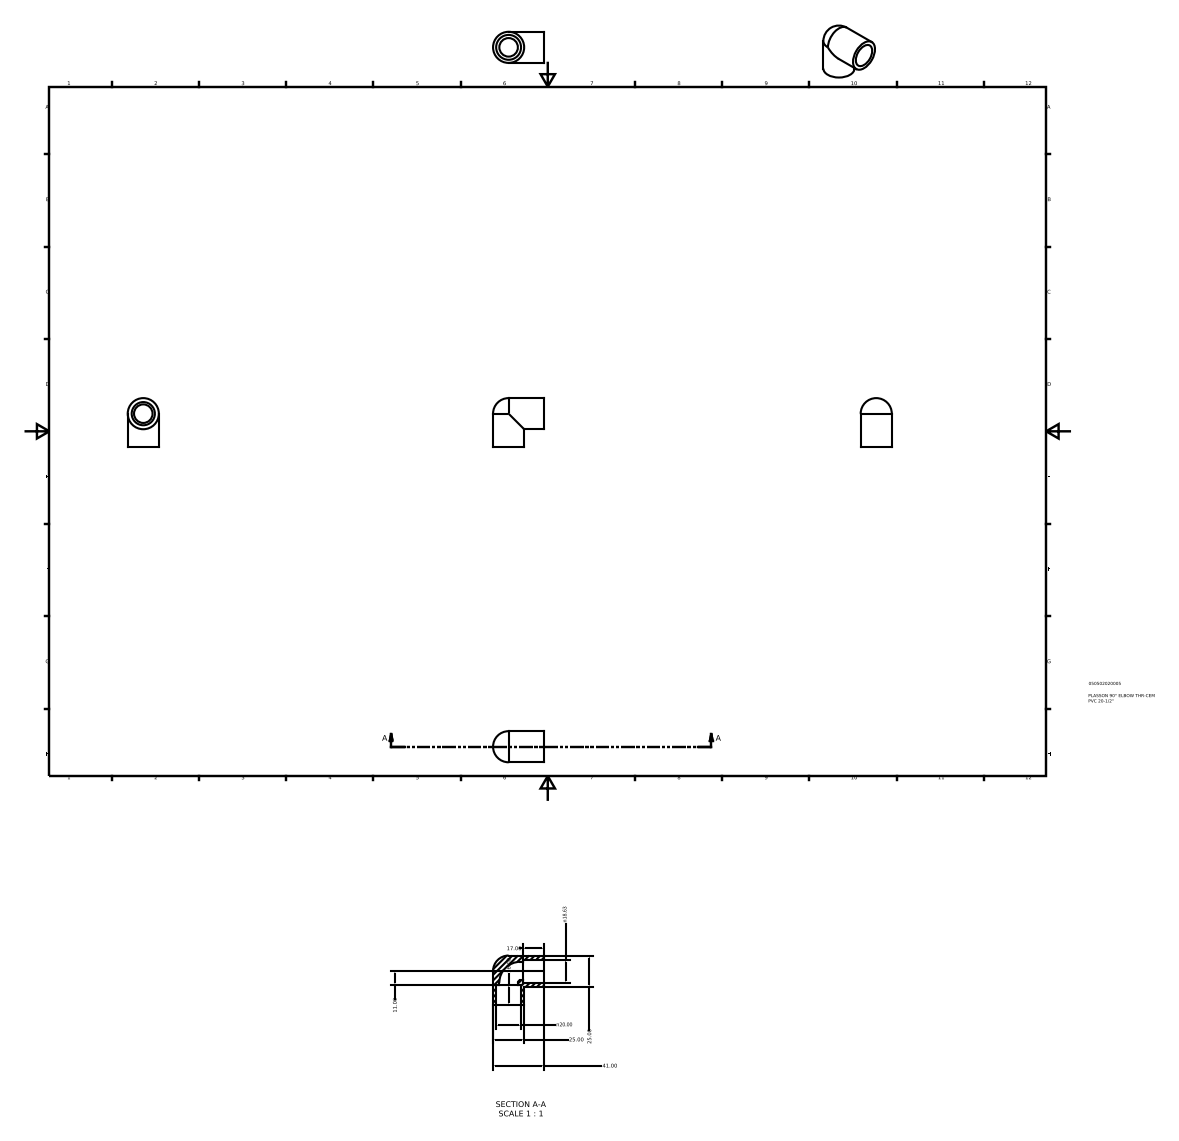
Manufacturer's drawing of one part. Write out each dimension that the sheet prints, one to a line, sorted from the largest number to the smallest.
41.00
25.00
25.00
n20.00
n18.63
17.00
16.00
11.00
